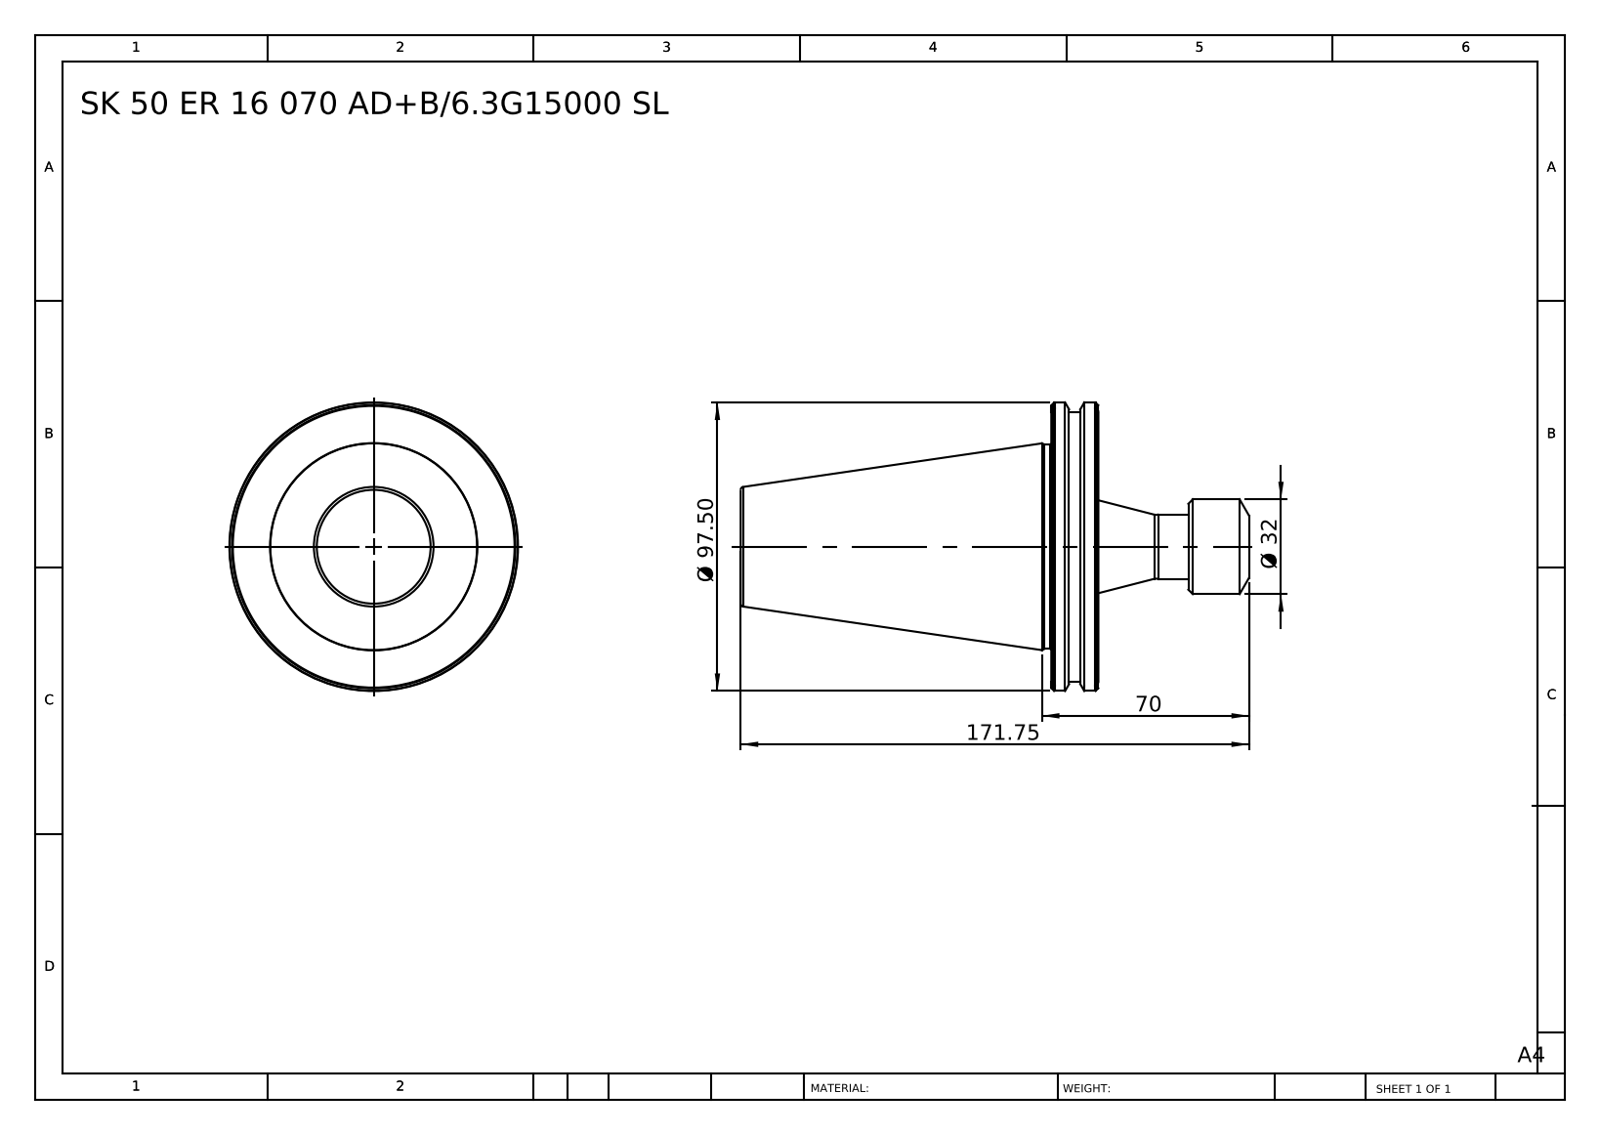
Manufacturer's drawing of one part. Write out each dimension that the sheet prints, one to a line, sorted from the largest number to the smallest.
171.75
Ø 97.50
70
Ø 32
